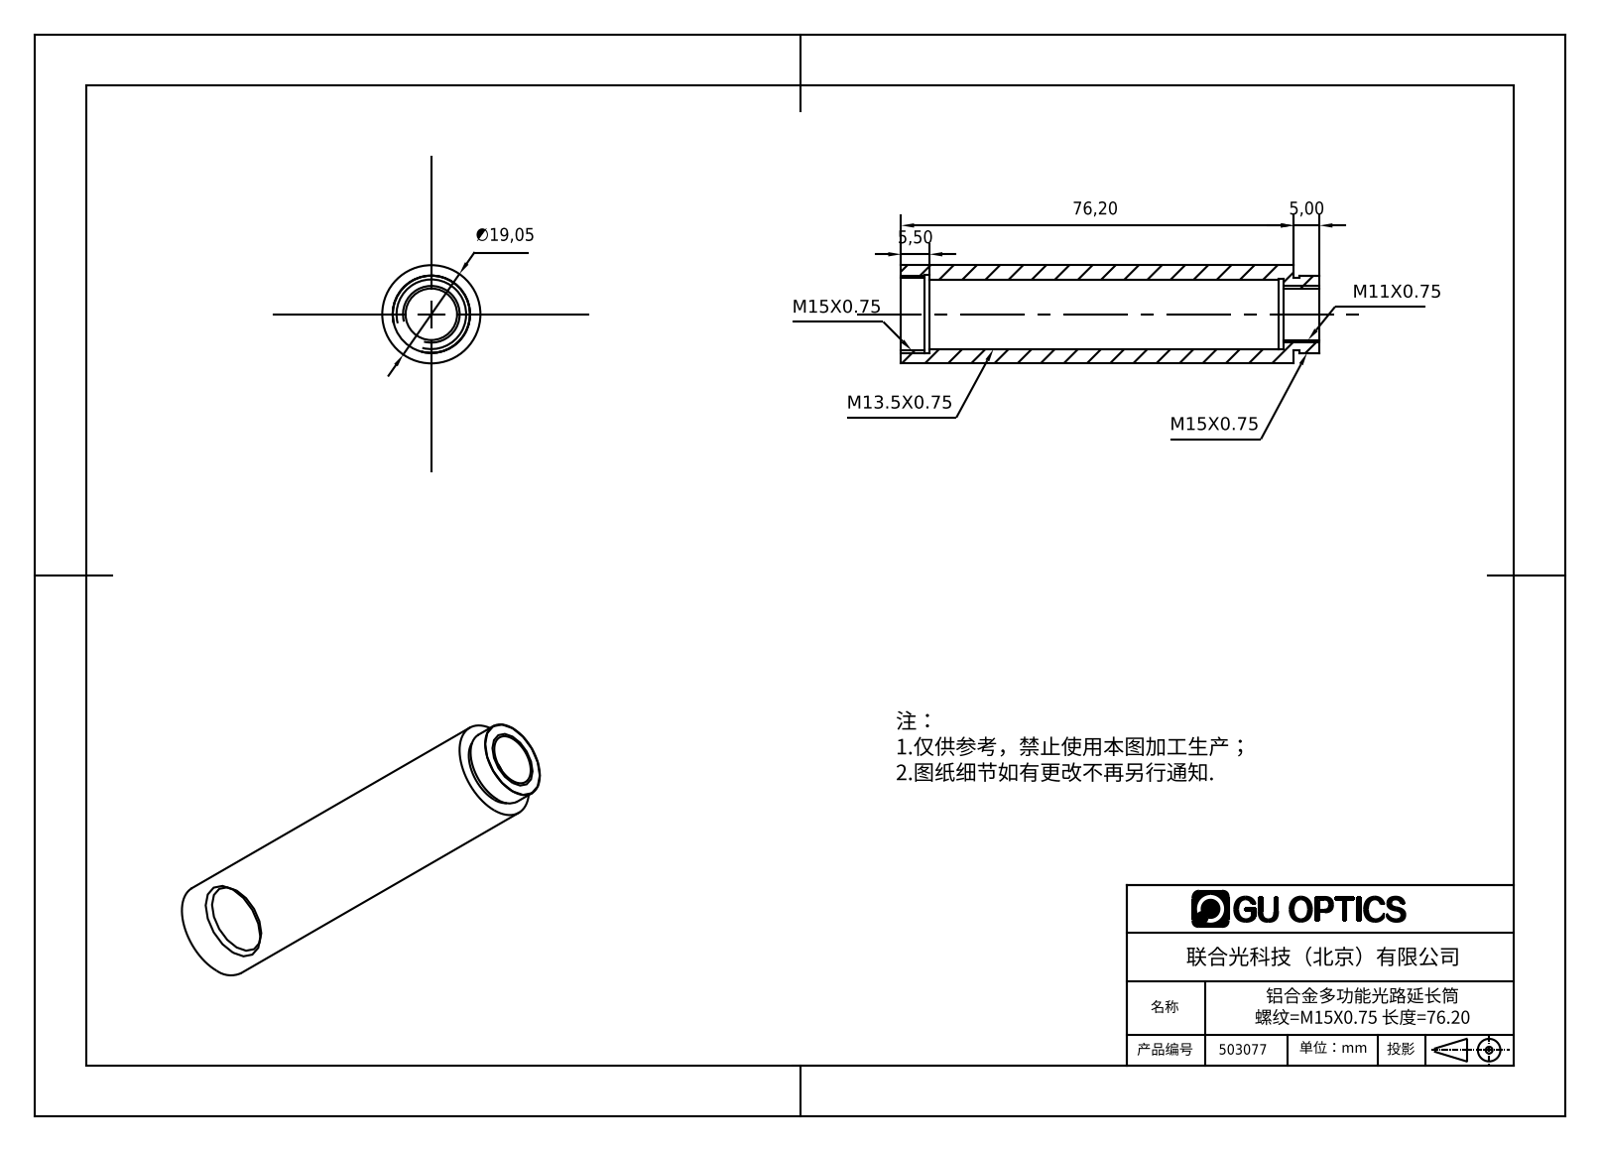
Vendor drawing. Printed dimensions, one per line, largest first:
76,20
∅19,05
5,50
5,00
